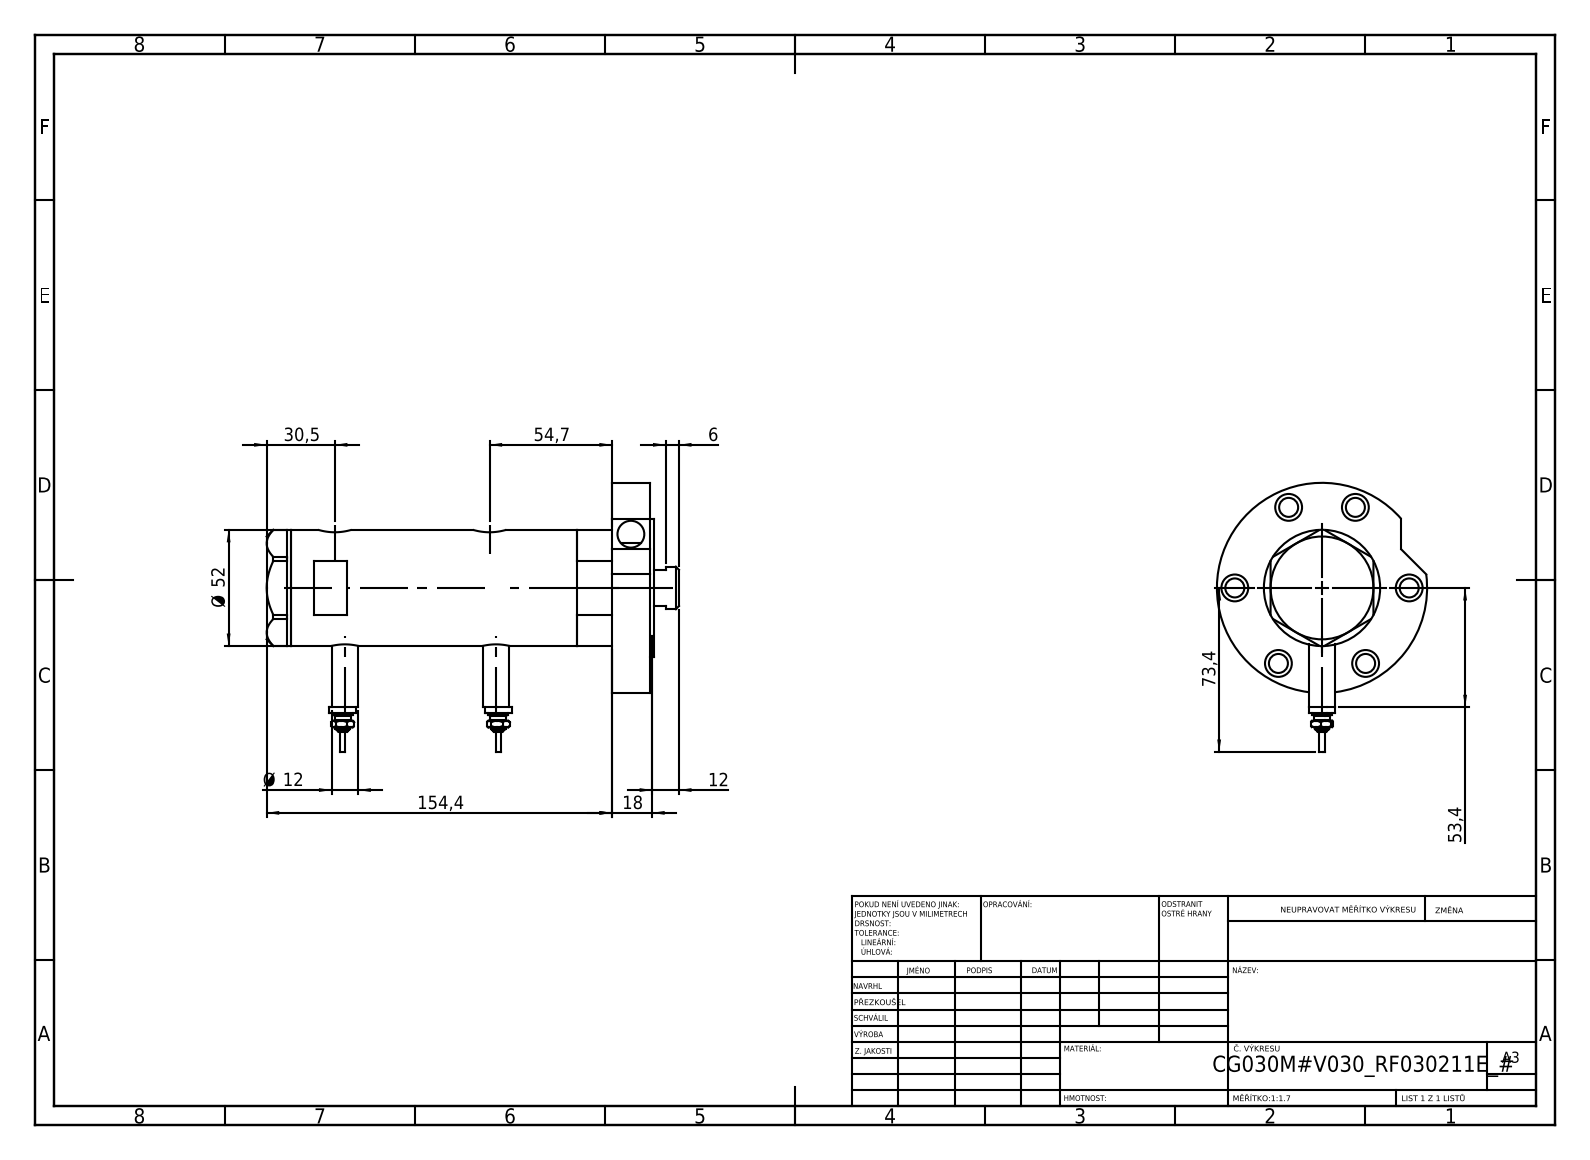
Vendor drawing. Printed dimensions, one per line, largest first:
154,4
73,4
54,7
53,4
Ø 52
30,5
18
12
Ø 12
6
